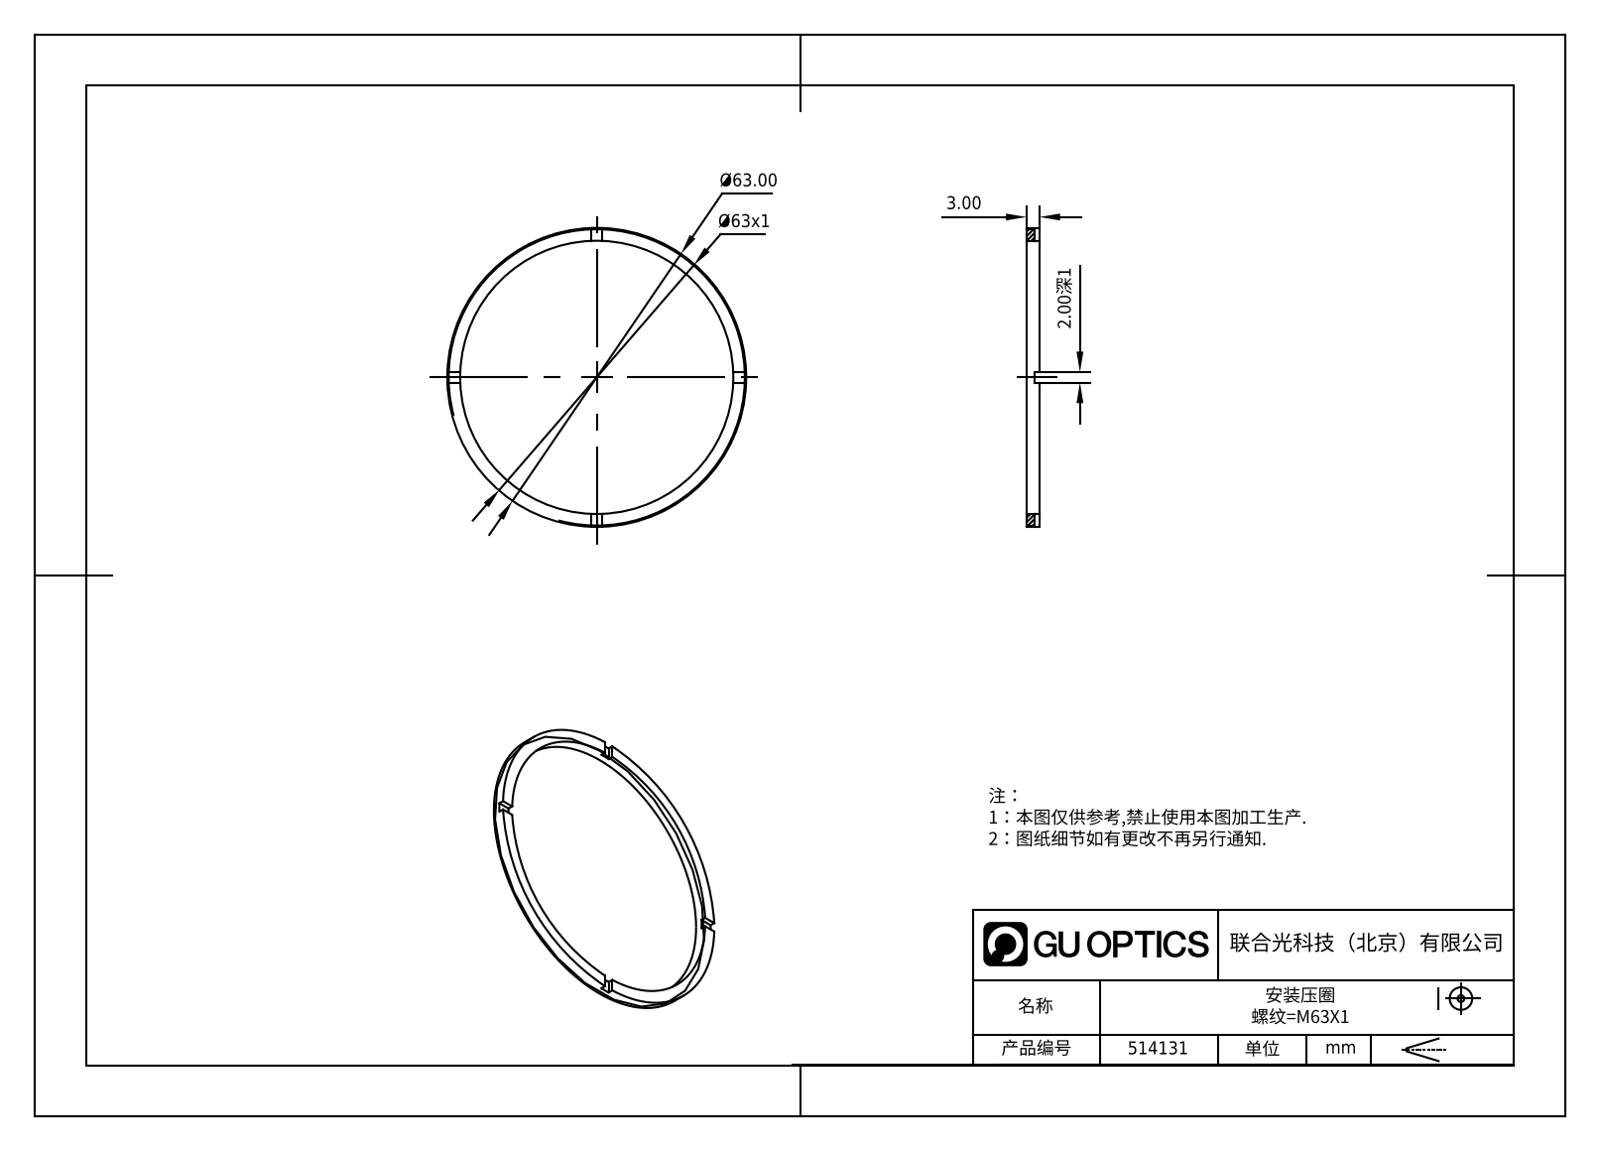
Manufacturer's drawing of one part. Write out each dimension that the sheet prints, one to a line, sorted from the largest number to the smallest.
Ø63.00
Ø63x1
3.00
2.00深1
